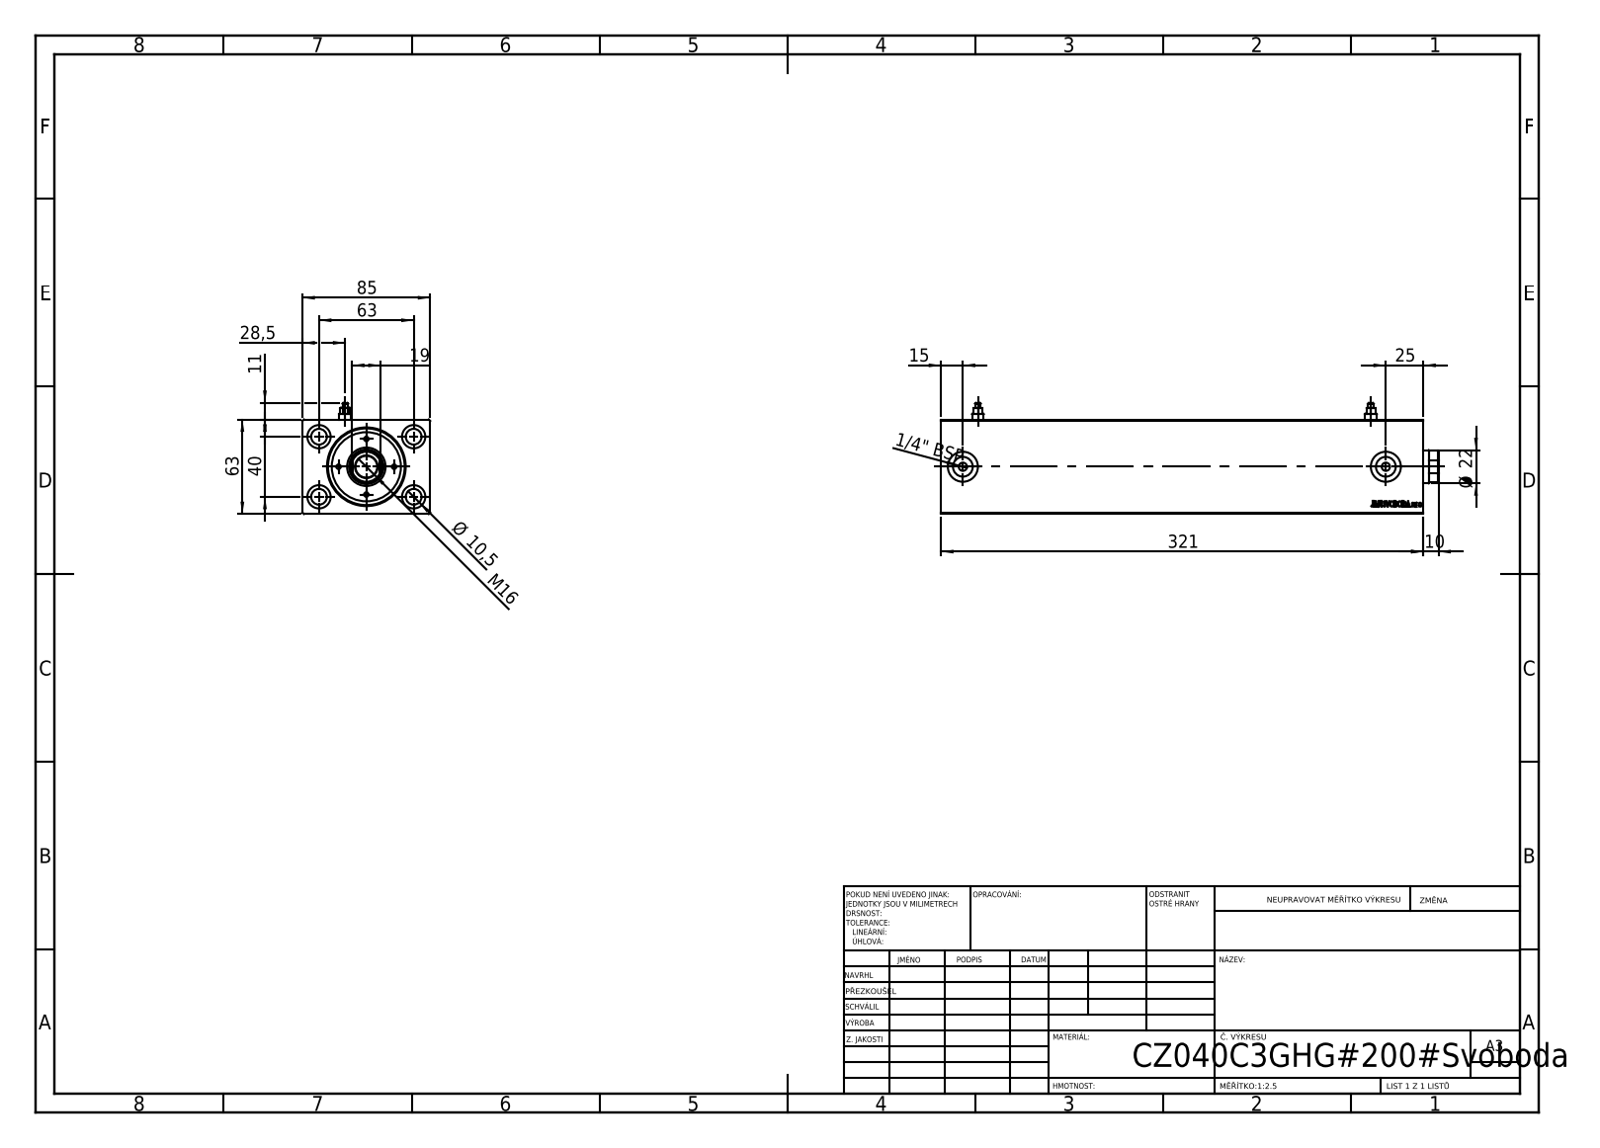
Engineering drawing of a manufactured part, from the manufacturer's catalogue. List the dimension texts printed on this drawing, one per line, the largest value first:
321
85
63
63
40
28,5
25
Ø 22
19
M16
15
11
Ø 10,5
10
1/4" BSP
